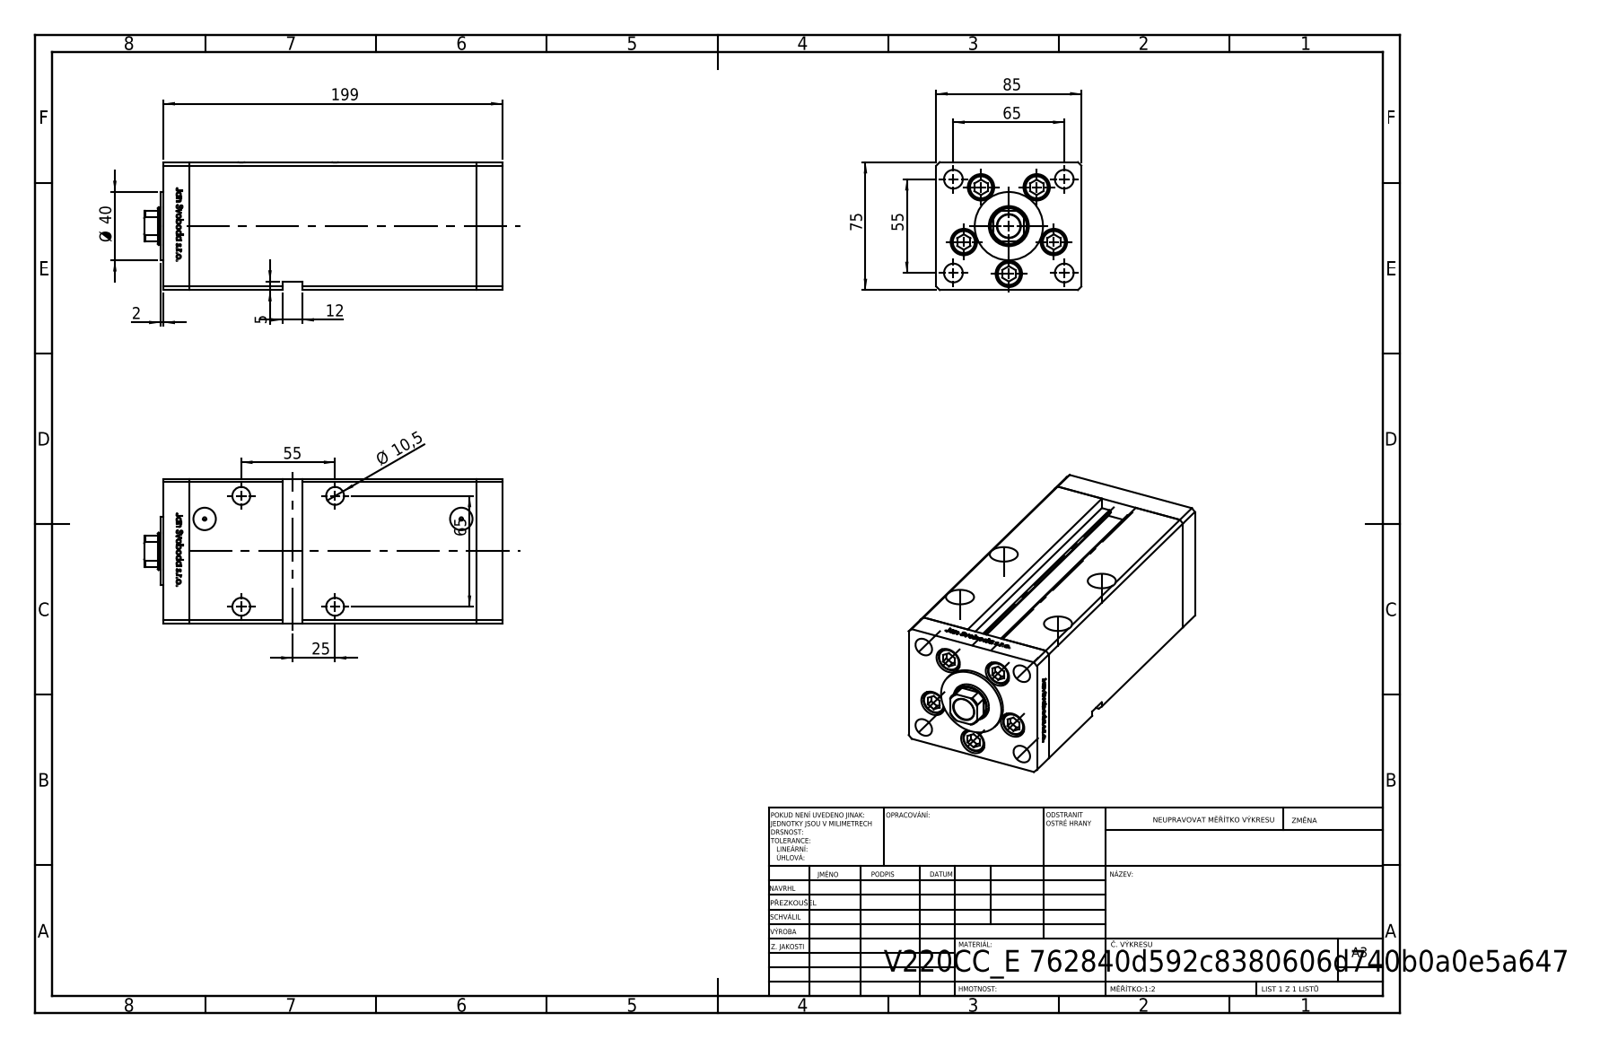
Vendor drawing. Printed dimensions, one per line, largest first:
199
85
75
65
65
55
55
Ø 40
25
12
Ø 10,5
5
2
